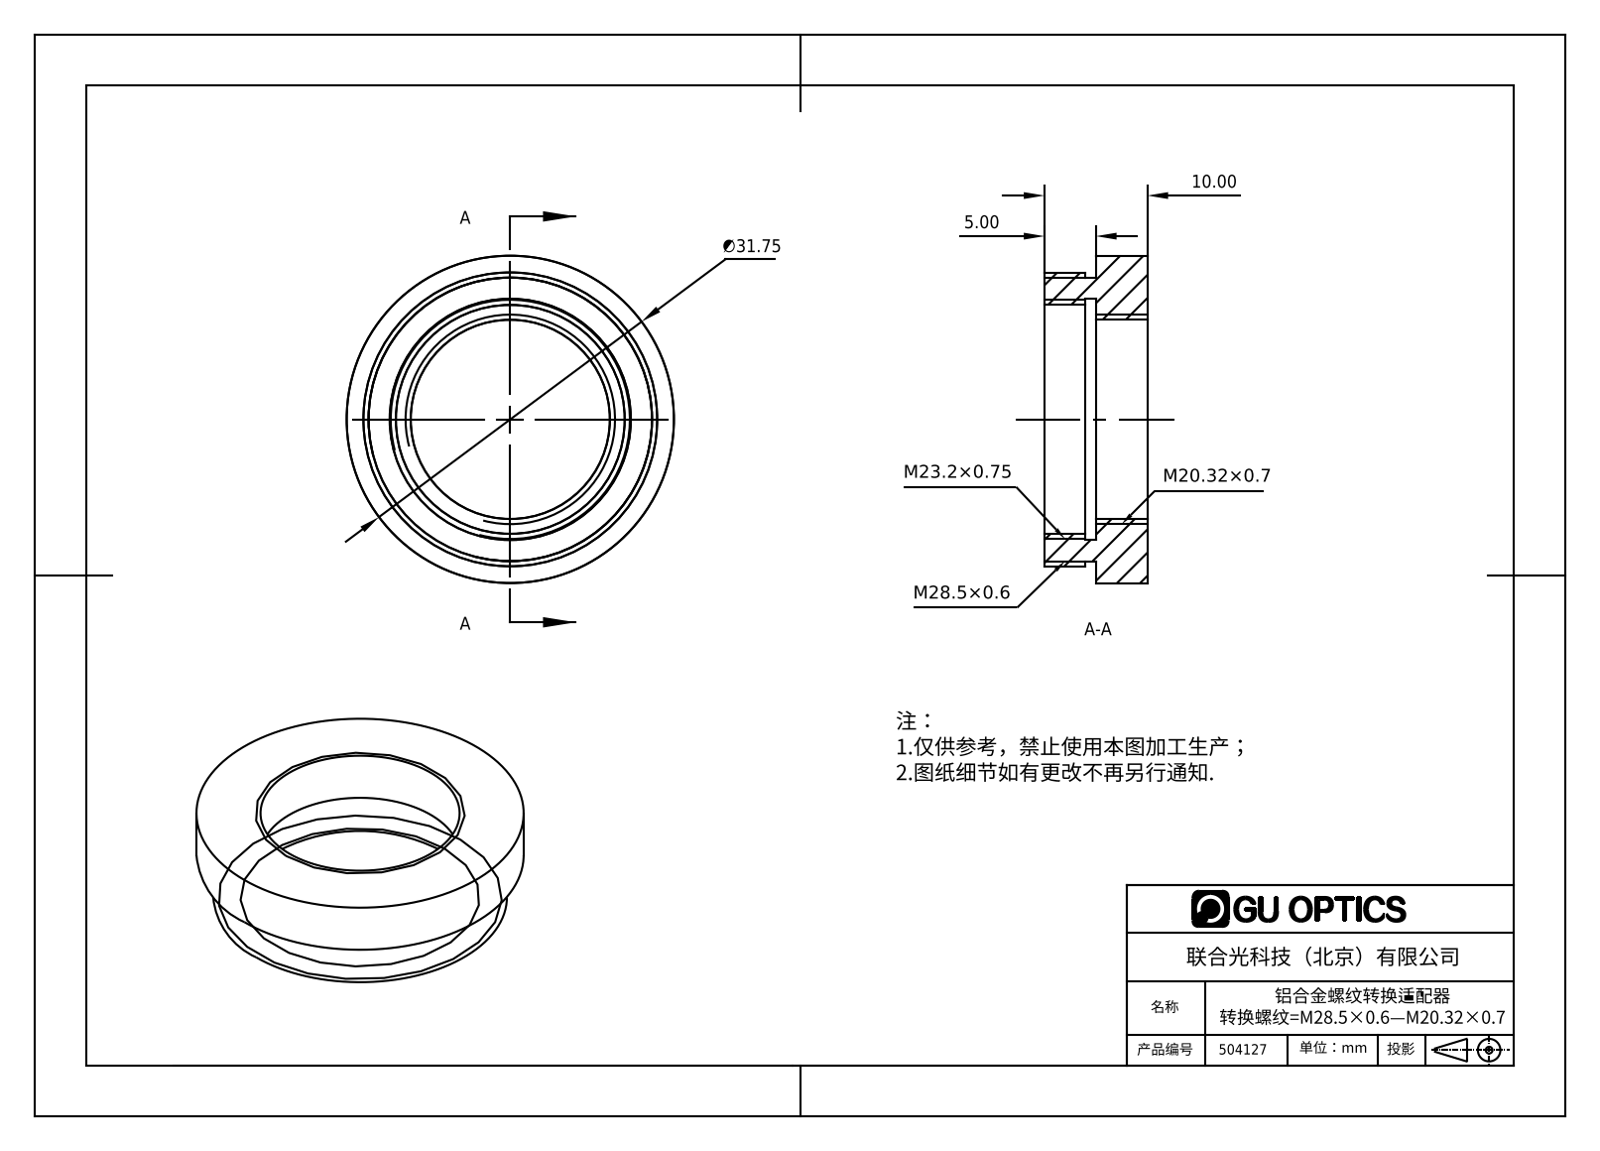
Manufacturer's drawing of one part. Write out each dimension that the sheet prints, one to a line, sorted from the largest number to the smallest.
∅31.75
10.00
5.00
